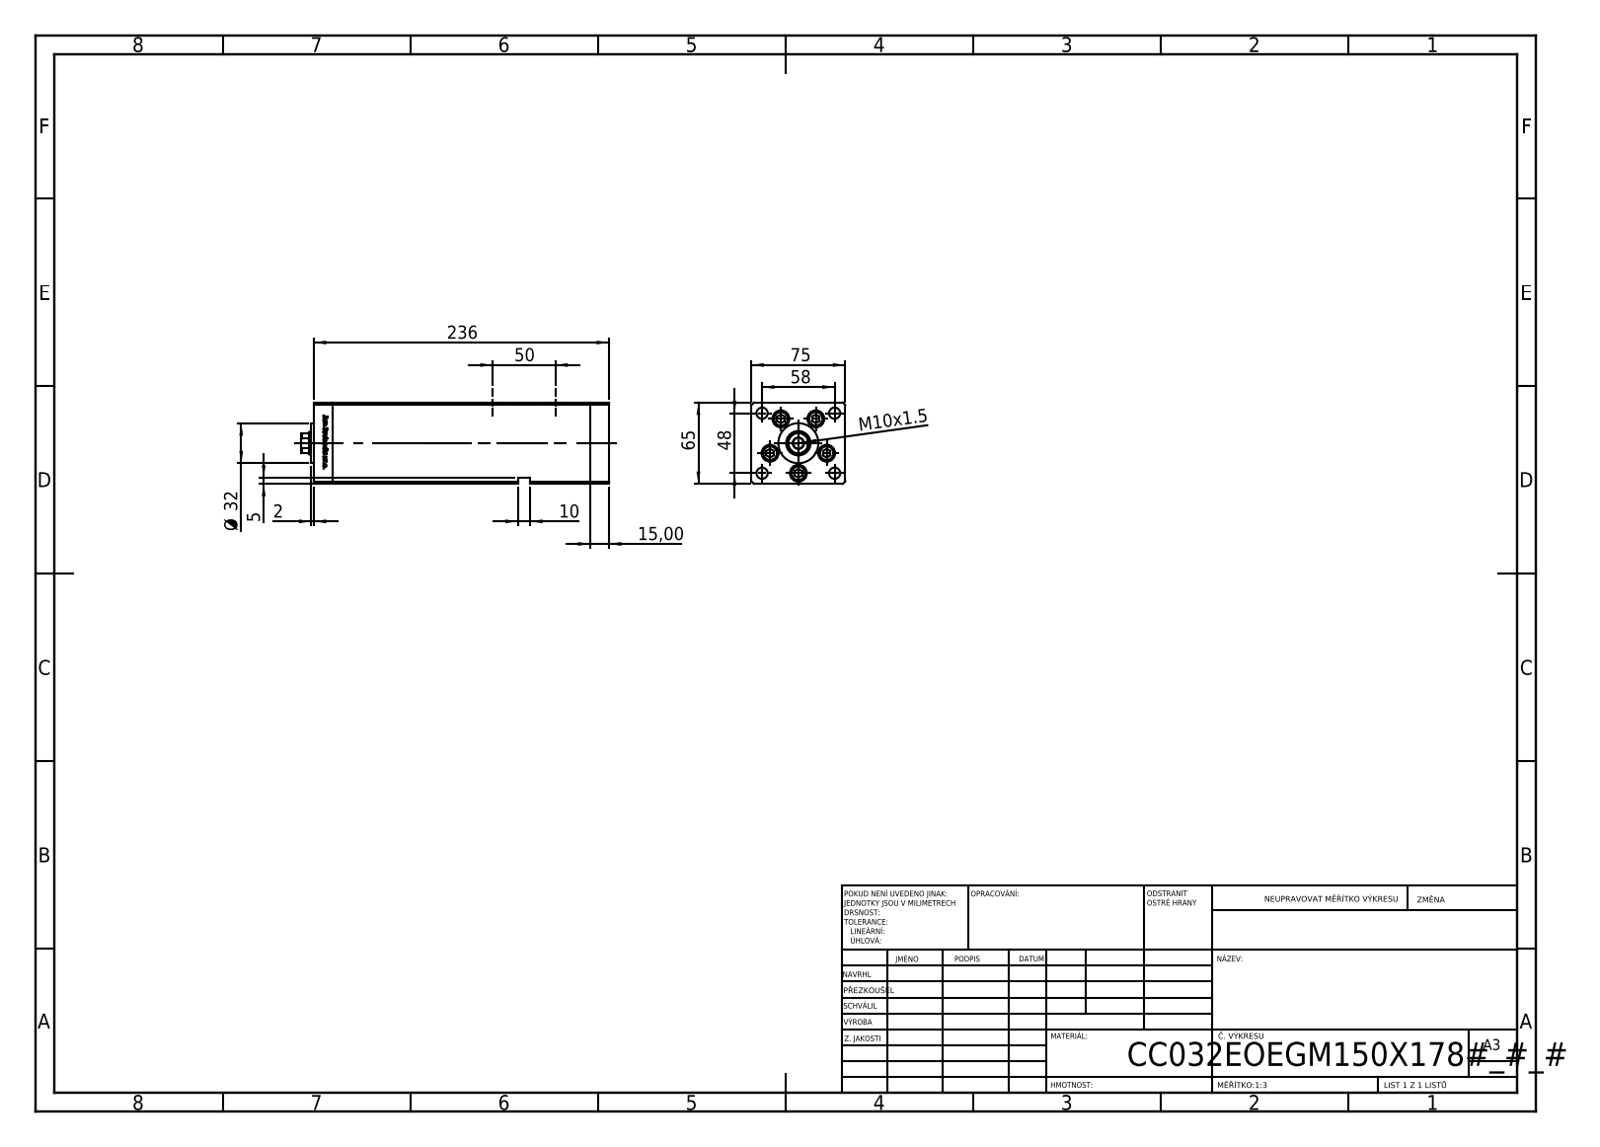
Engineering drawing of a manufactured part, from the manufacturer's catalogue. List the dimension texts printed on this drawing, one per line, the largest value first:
236
75
65
58
50
48
Ø 32
15,00
10
M10x1.5
5
2
